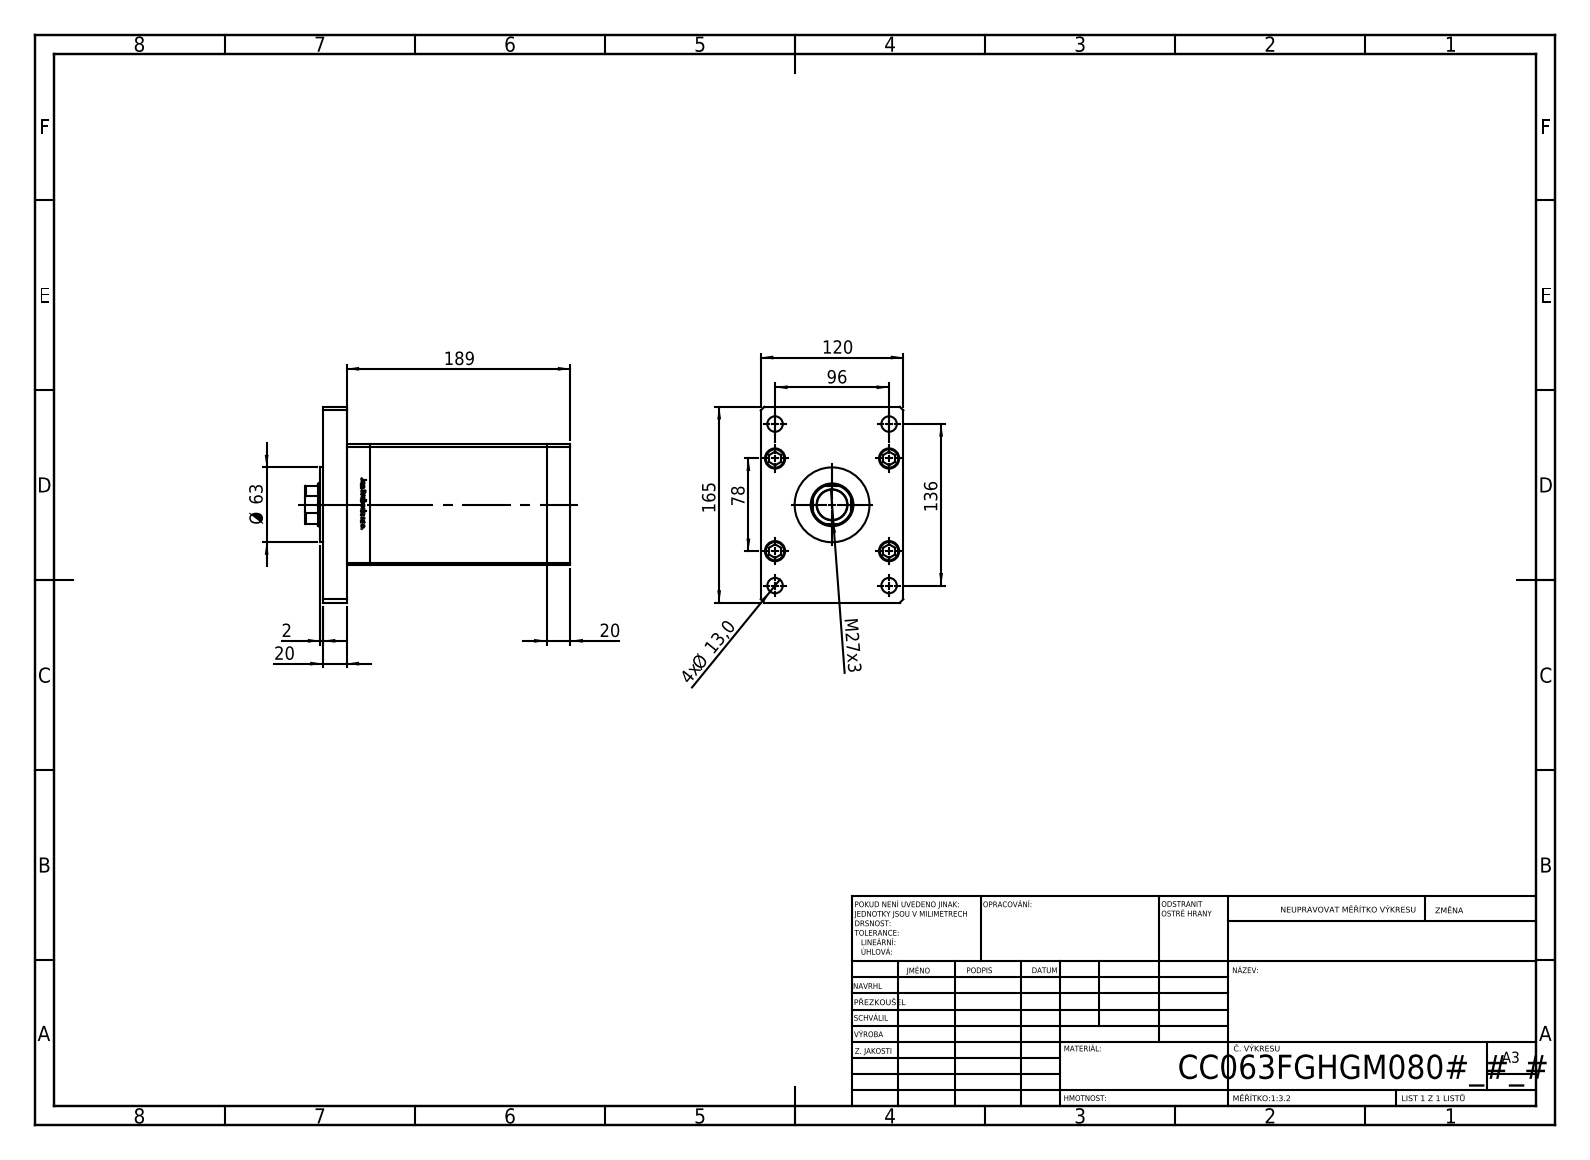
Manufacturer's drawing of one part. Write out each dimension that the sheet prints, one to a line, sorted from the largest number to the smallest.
189
165
136
120
96
78
Ø 63
M27x3
20
20
4x Ø 13,0
2
